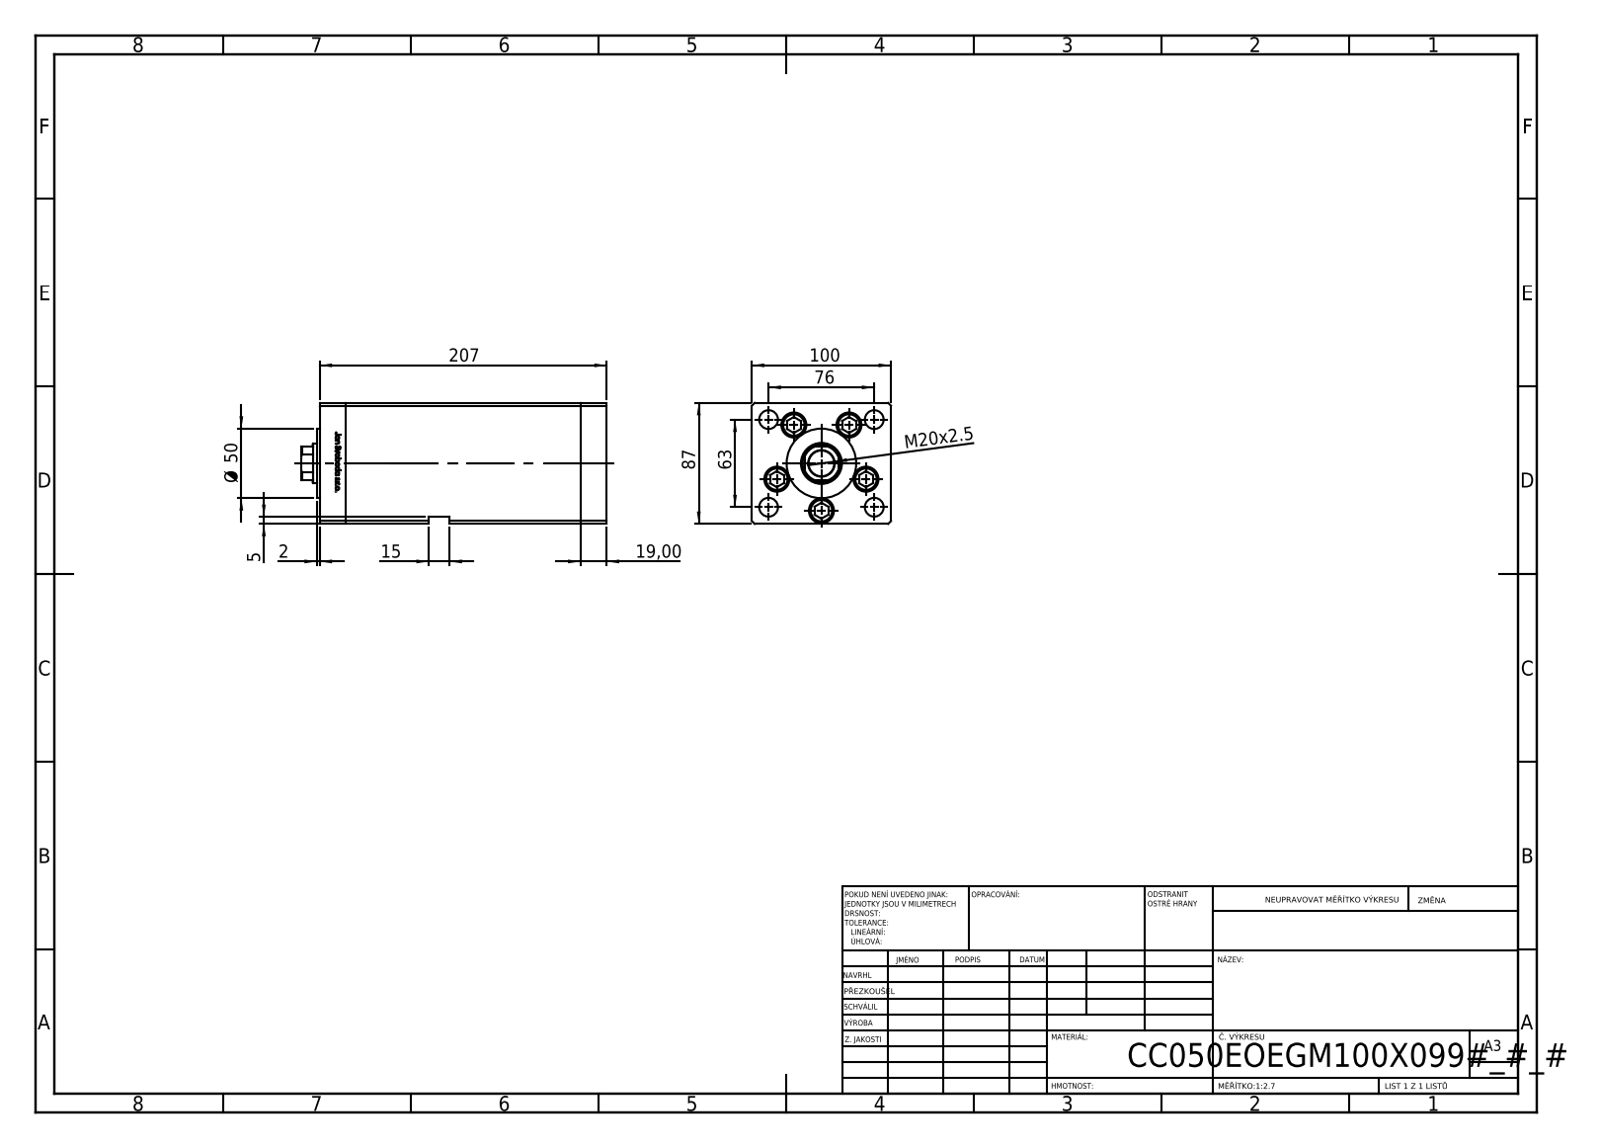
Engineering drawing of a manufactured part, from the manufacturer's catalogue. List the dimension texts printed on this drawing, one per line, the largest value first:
207
100
87
76
63
Ø 50
M20x2.5
19,00
15
5
2
